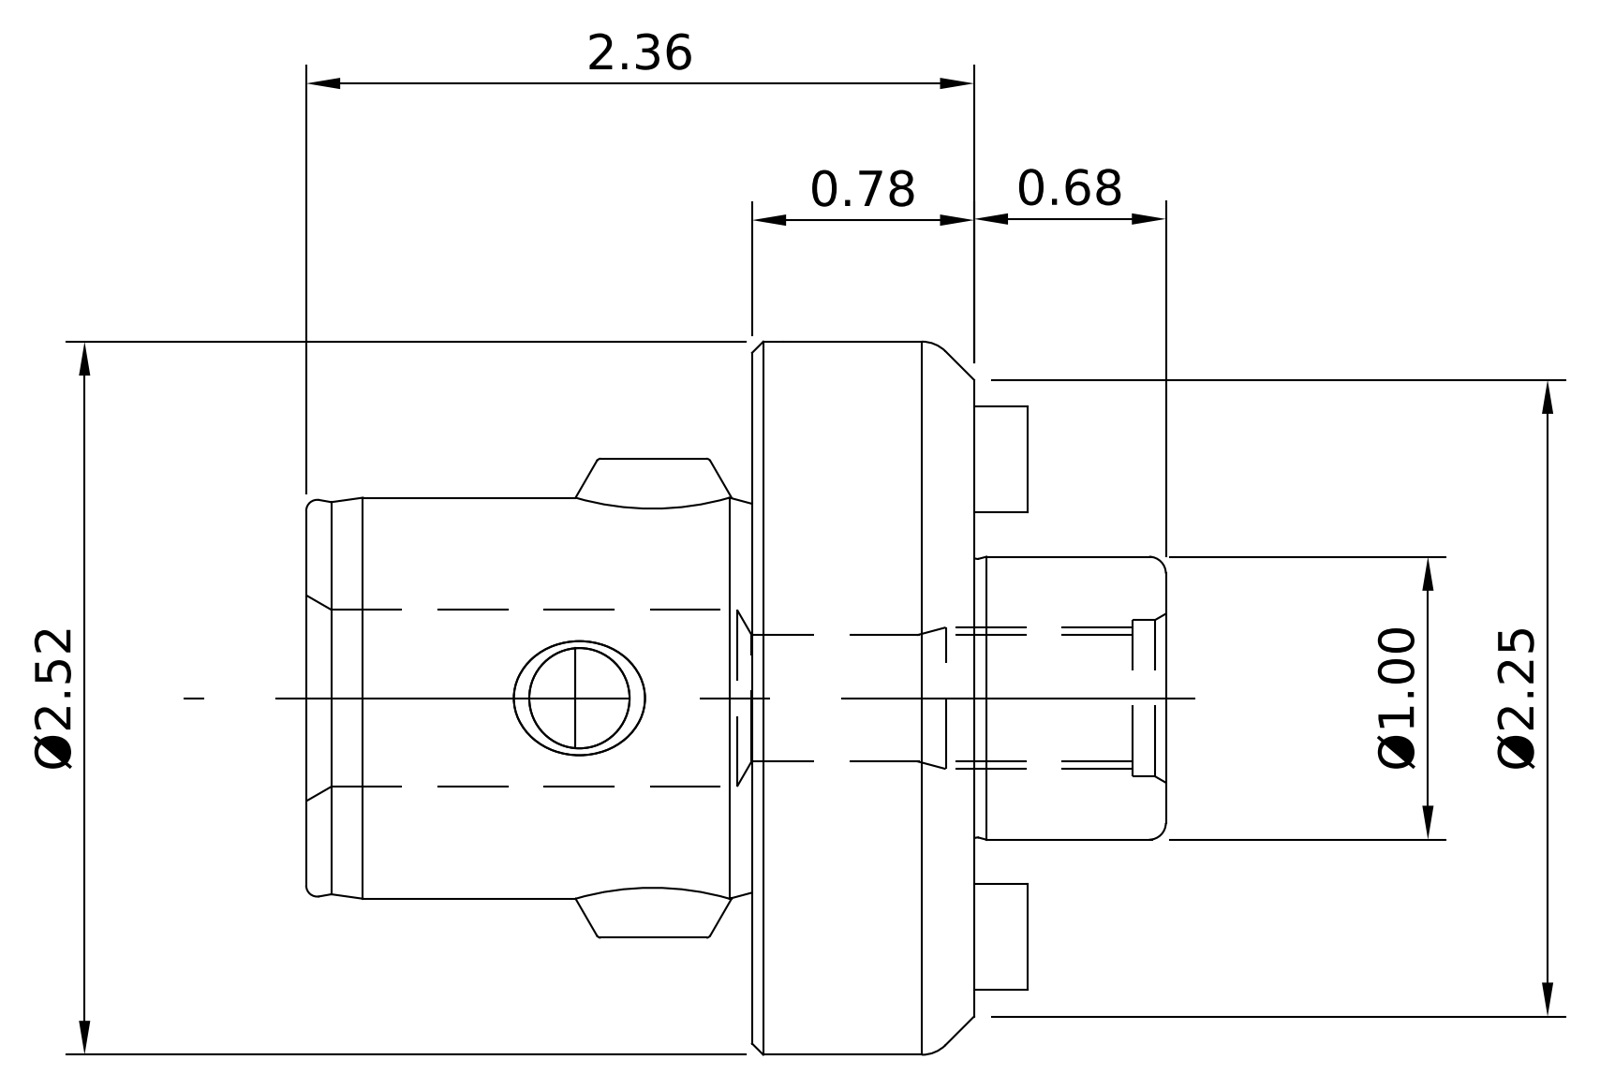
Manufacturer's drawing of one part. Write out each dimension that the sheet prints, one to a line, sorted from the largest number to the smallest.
Ø2.52
2.36
Ø2.25
Ø1.00
0.78
0.68
